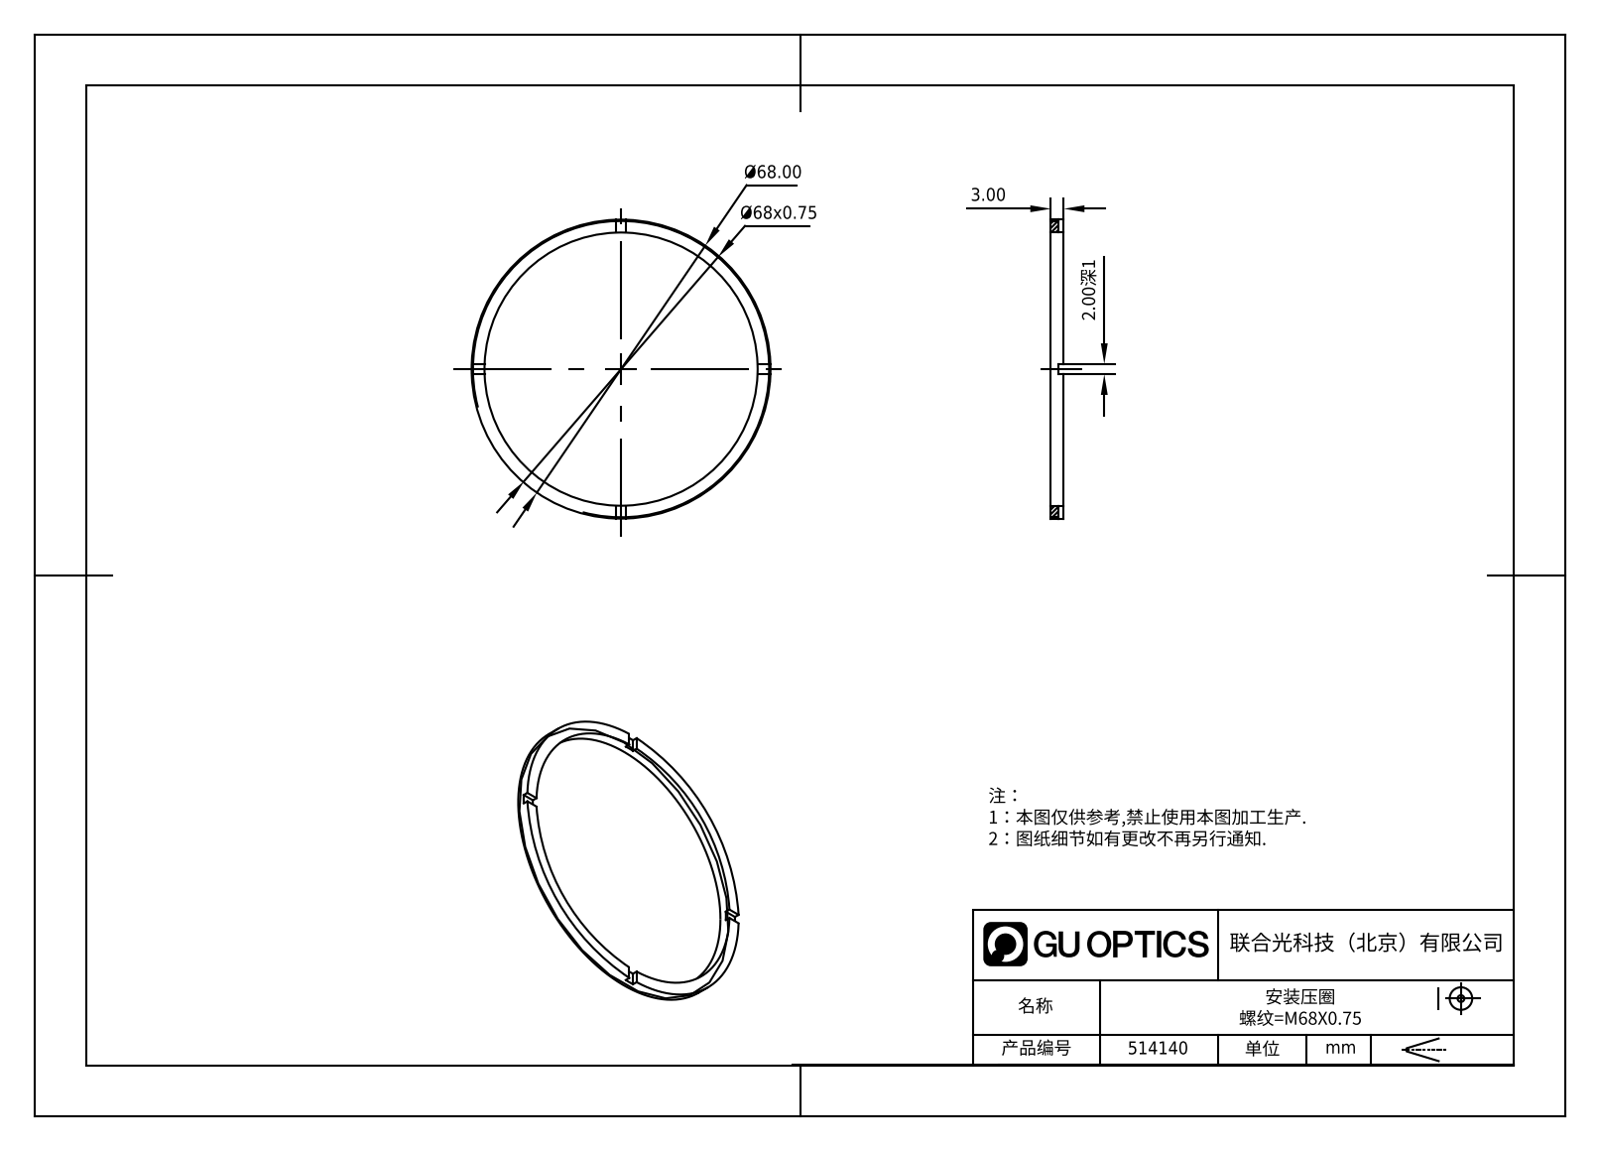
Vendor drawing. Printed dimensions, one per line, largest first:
Ø68.00
Ø68x0.75
3.00
2.00深1
